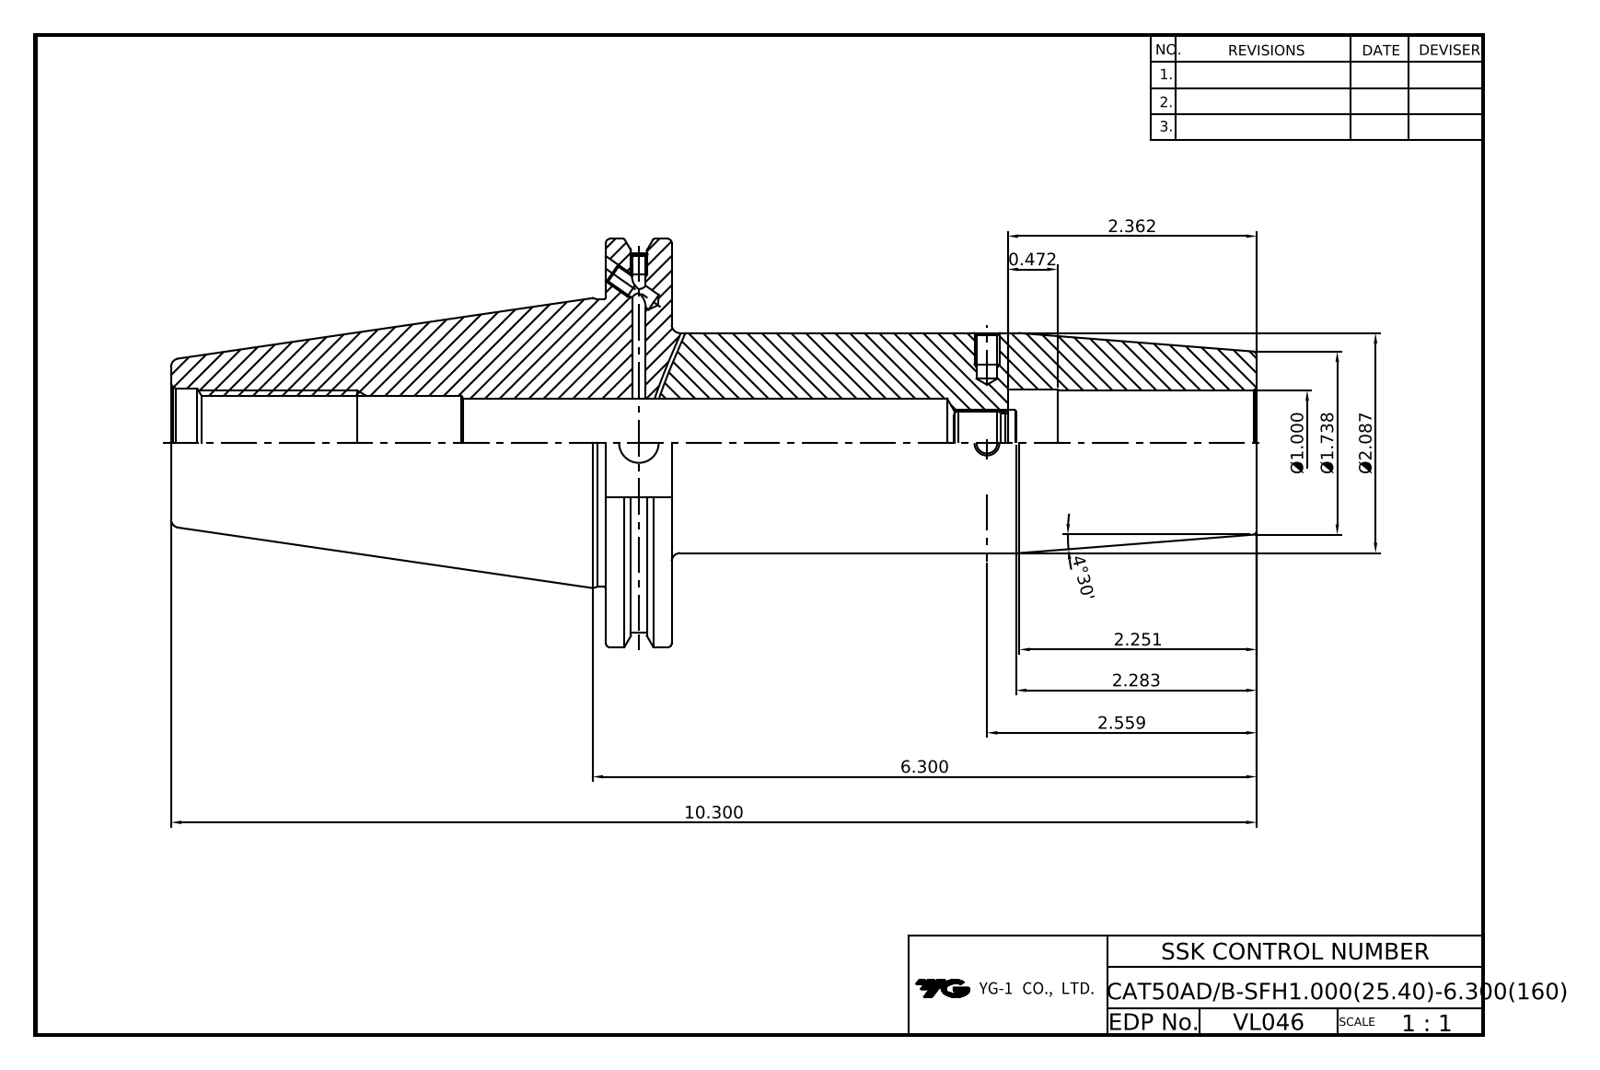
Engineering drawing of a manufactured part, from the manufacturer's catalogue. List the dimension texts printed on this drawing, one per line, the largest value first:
10.300
6.300
4°30'
2.559
2.362
2.283
2.251
Ø2.087
Ø1.738
Ø1.000
0.472
